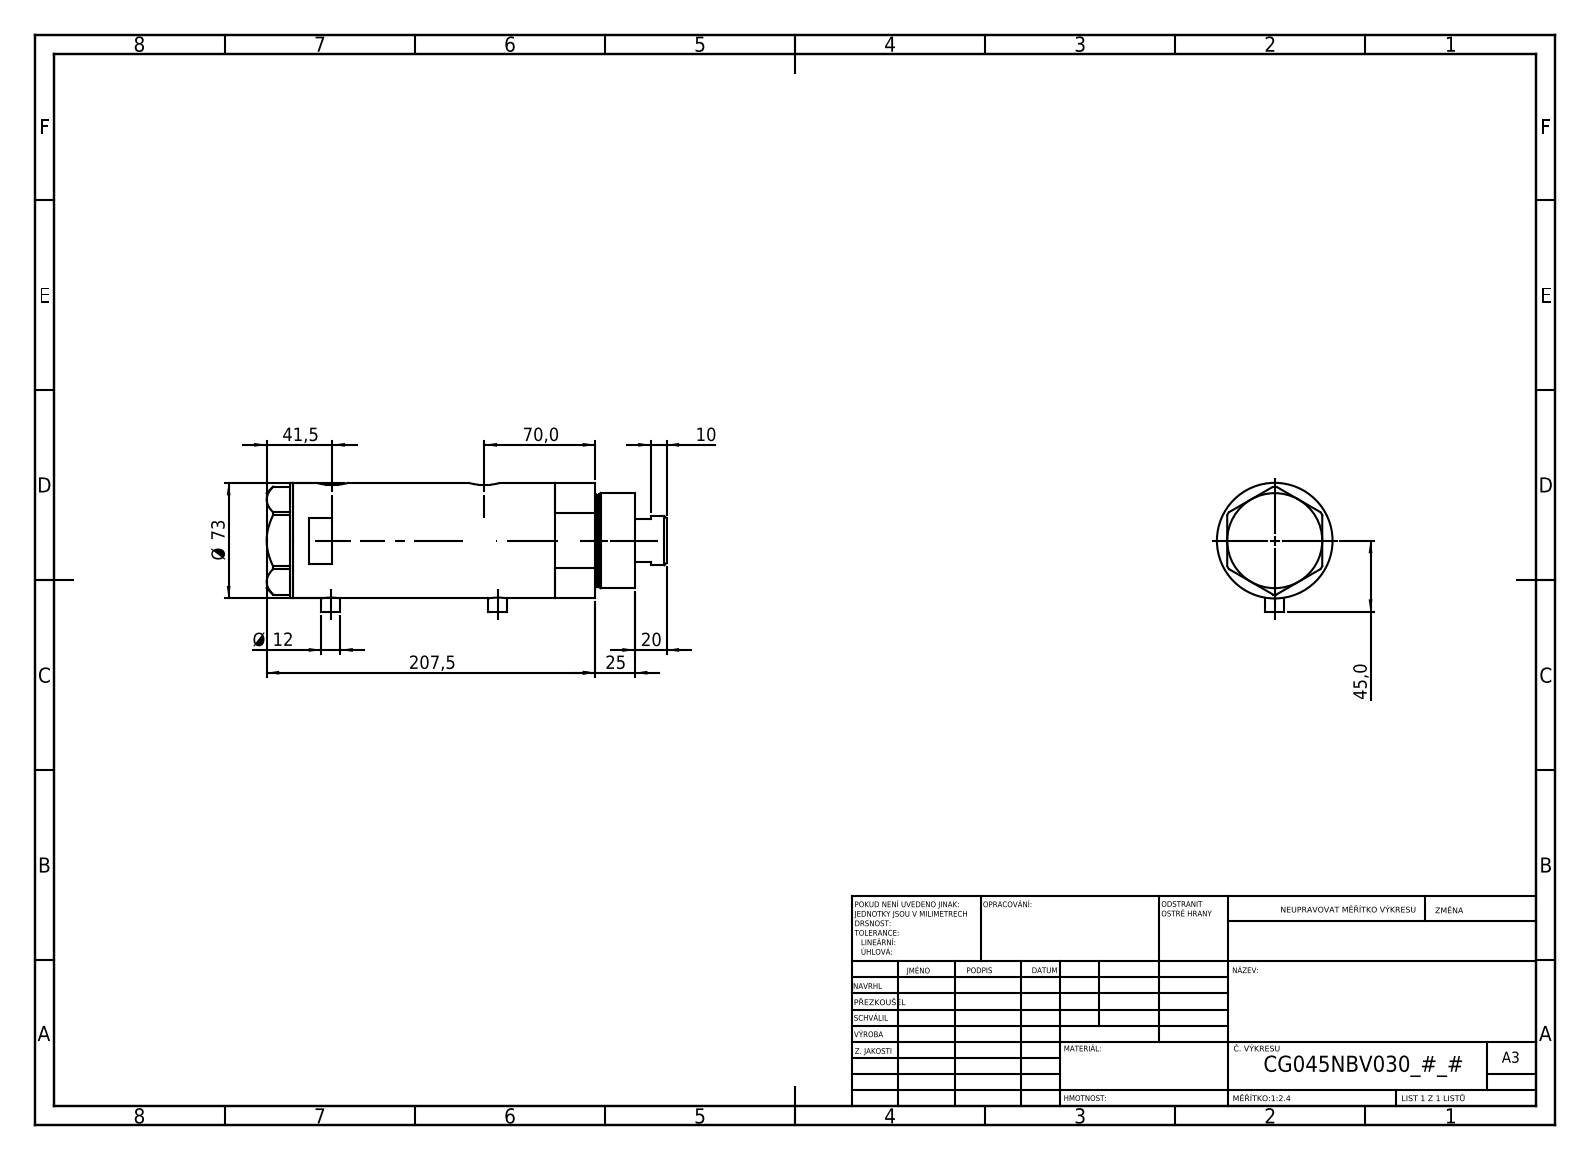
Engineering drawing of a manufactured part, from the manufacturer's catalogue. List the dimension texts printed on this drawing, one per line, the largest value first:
207,5
Ø 73
70,0
45,0
41,5
25
20
Ø 12
10
